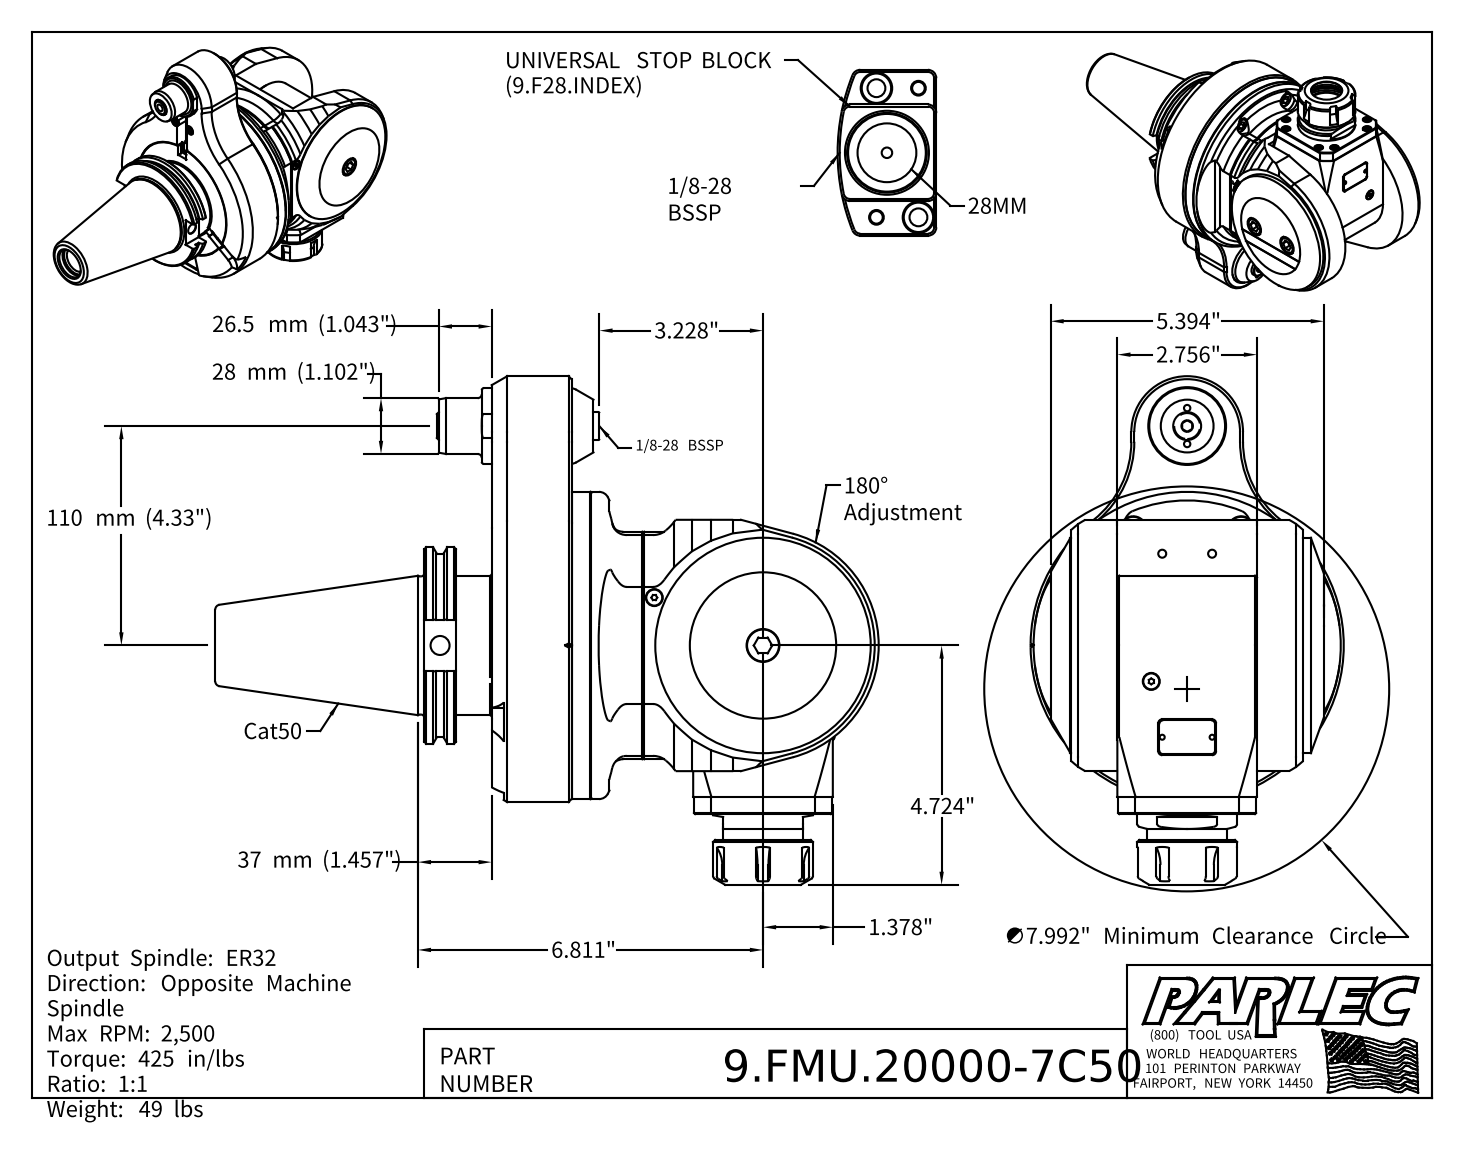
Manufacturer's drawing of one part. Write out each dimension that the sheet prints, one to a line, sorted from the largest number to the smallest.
110 mm (4.33")
37 mm (1.457")
28 mm (1.102")
26.5 mm (1.043")
∅7.992" Minimum Clearance Circle
6.811"
5.394"
4.724"
3.228"
2.756"
1.378"
